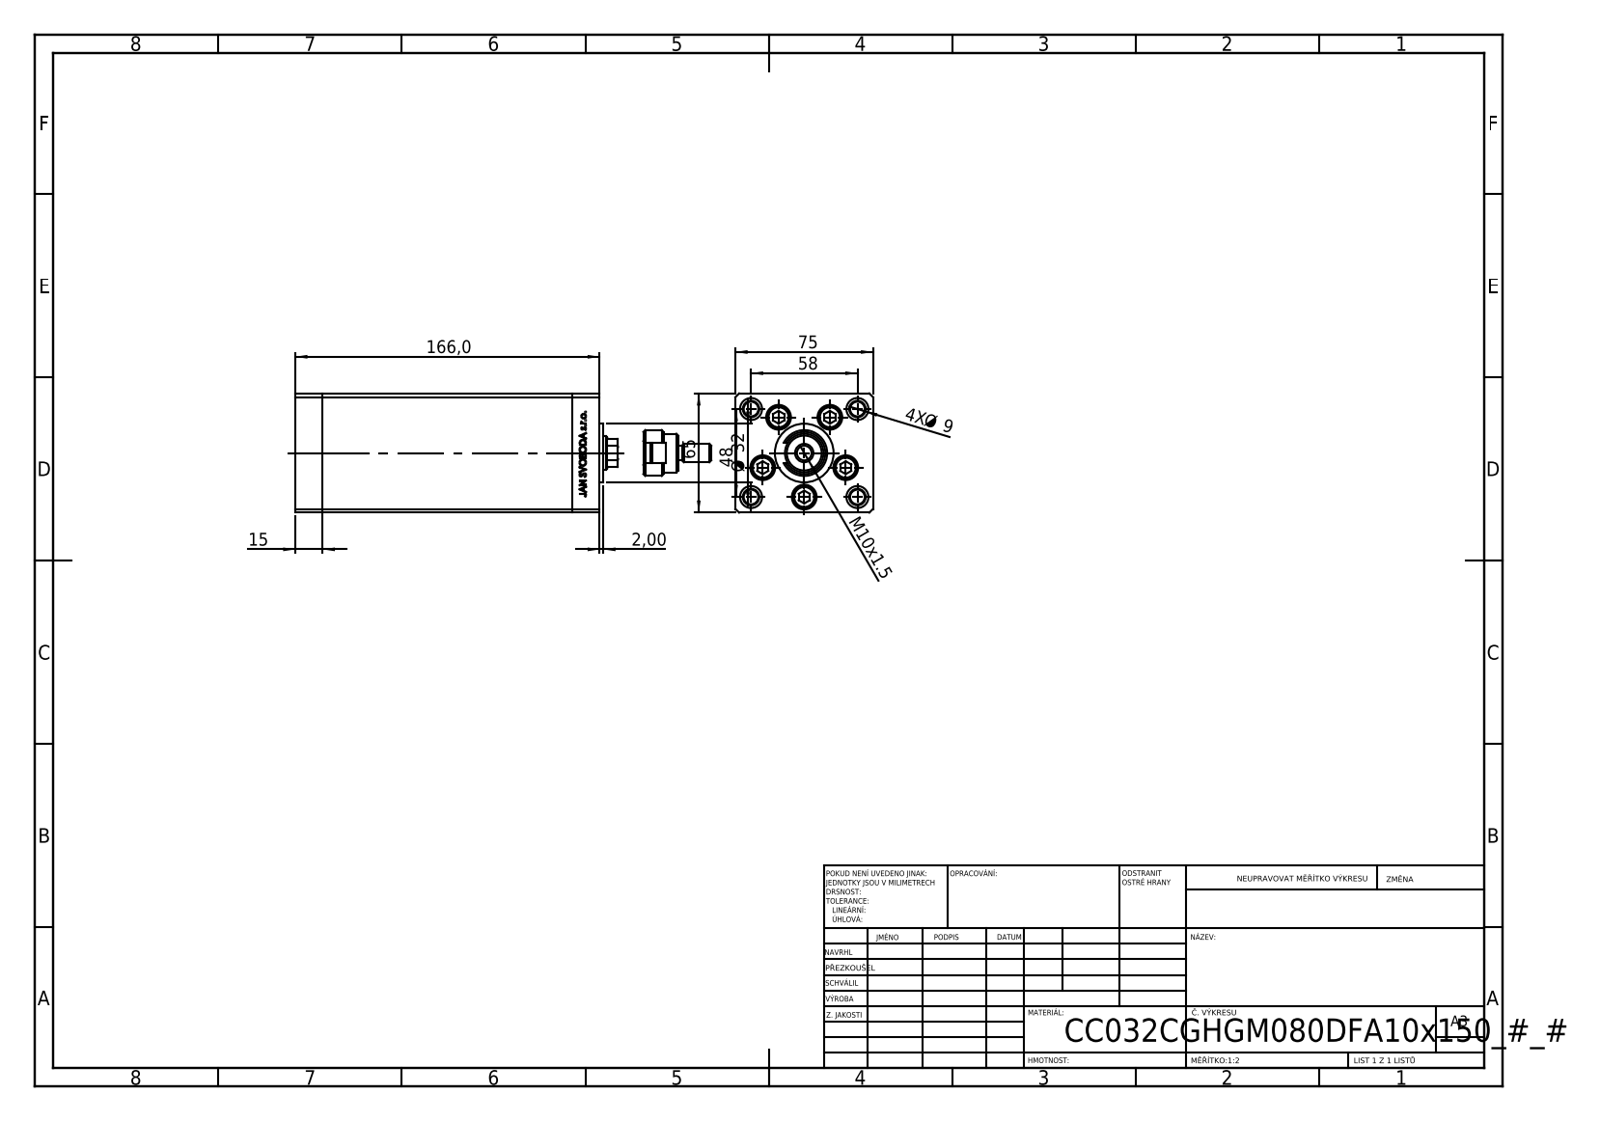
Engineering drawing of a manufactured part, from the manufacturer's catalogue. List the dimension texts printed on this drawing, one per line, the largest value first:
166,0
75
65
58
48
Ø 32
15
M10x1.5
4X Ø 9
2,00
